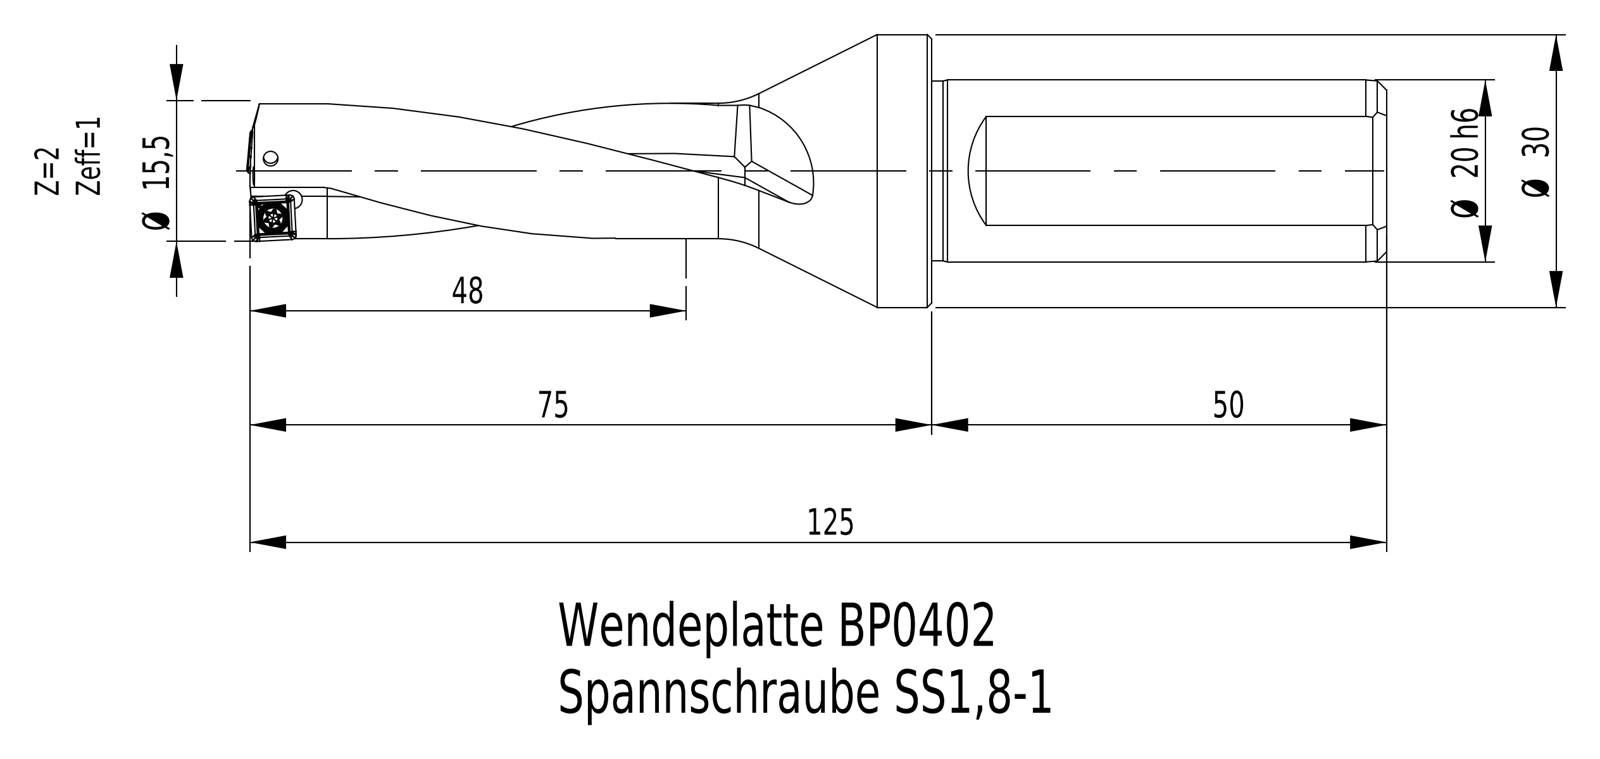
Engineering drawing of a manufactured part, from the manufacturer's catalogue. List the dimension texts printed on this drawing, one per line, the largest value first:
125
75
50
48
Ø 30
Ø 20 h6
Ø 15,5
